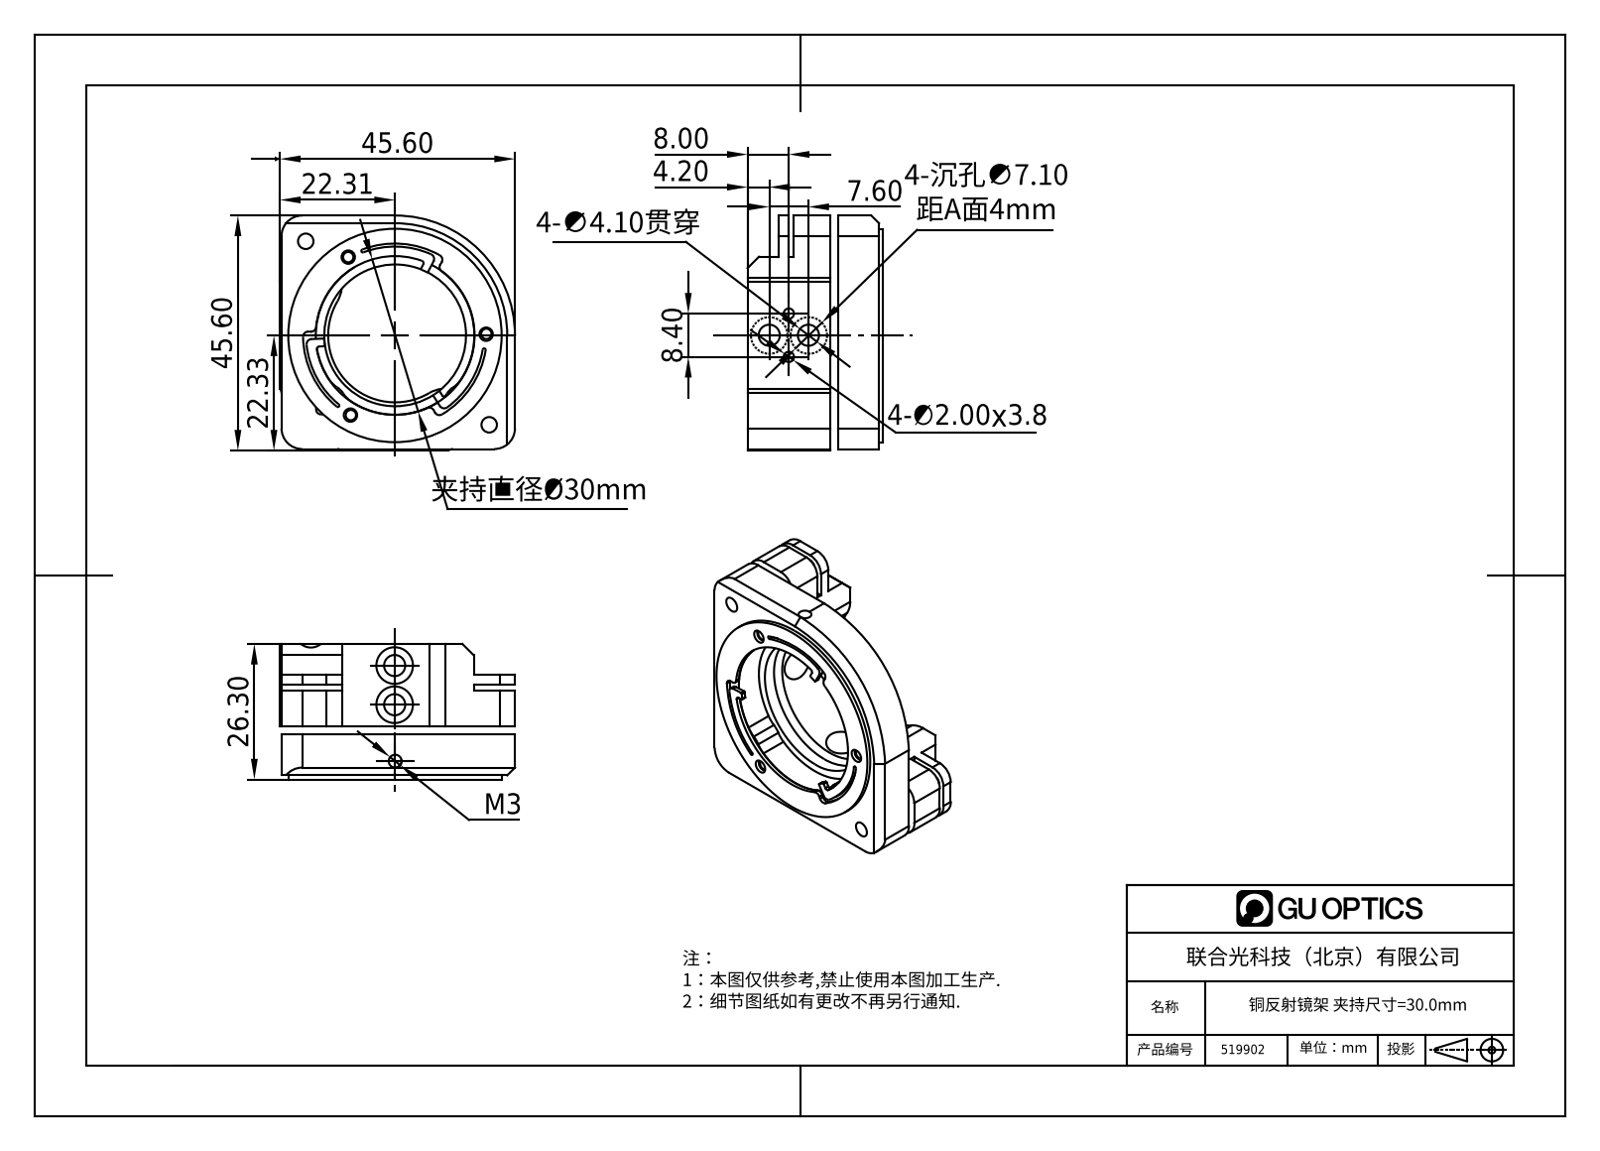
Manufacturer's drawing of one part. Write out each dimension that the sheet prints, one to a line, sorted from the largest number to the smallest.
45.60
45.60
夹持直径Ø30mm
26.30
22.33
22.31
8.40
8.00
7.60
4.20
4-x3.8
4-沉孔距A面4mm
4-贯穿
M3
